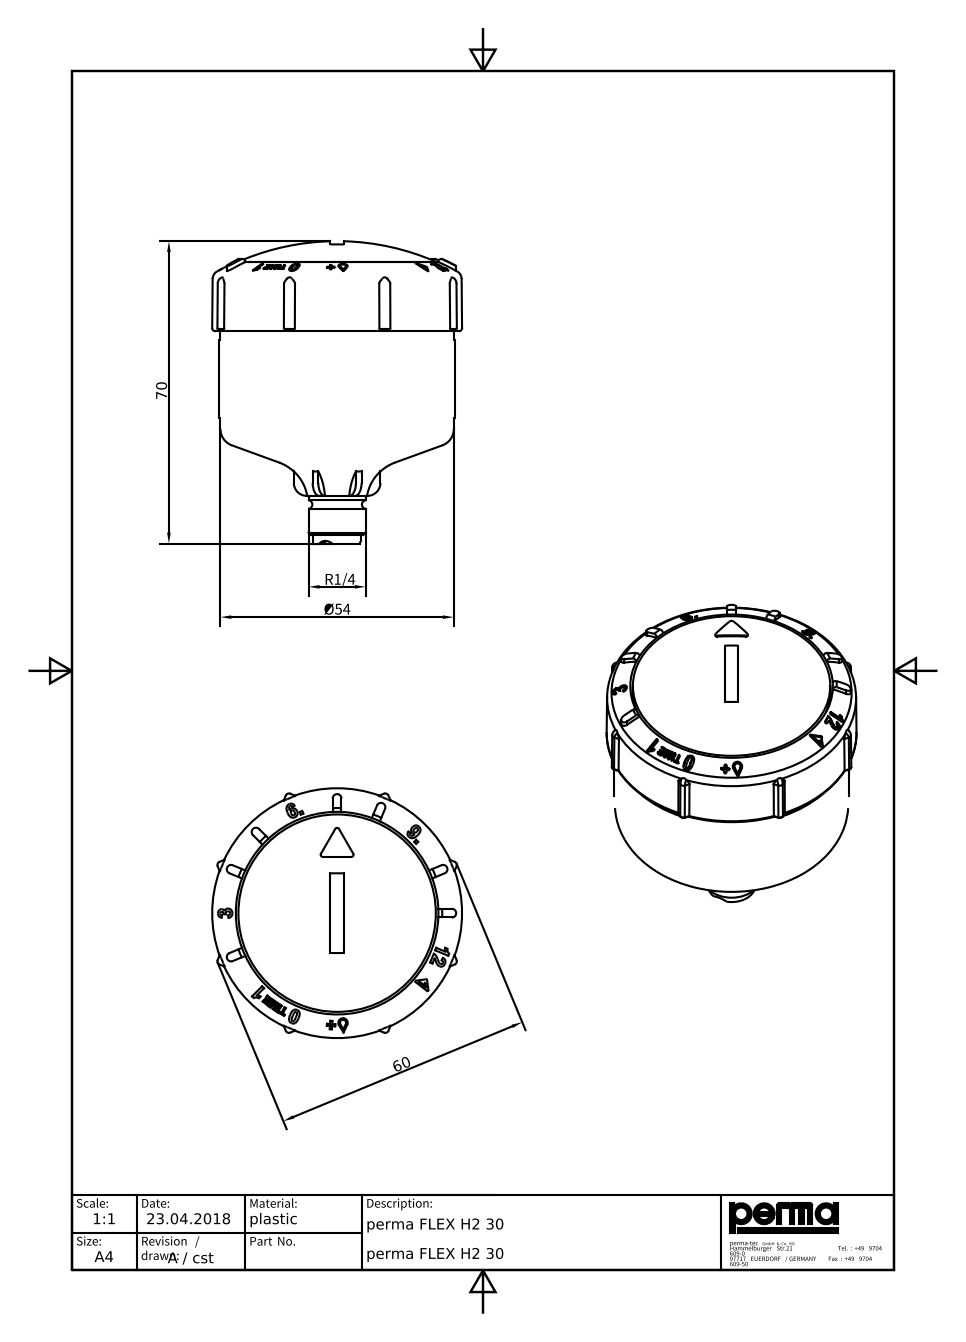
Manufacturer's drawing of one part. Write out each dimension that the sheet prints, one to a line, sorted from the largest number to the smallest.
70
60
Ø54
R1/4
